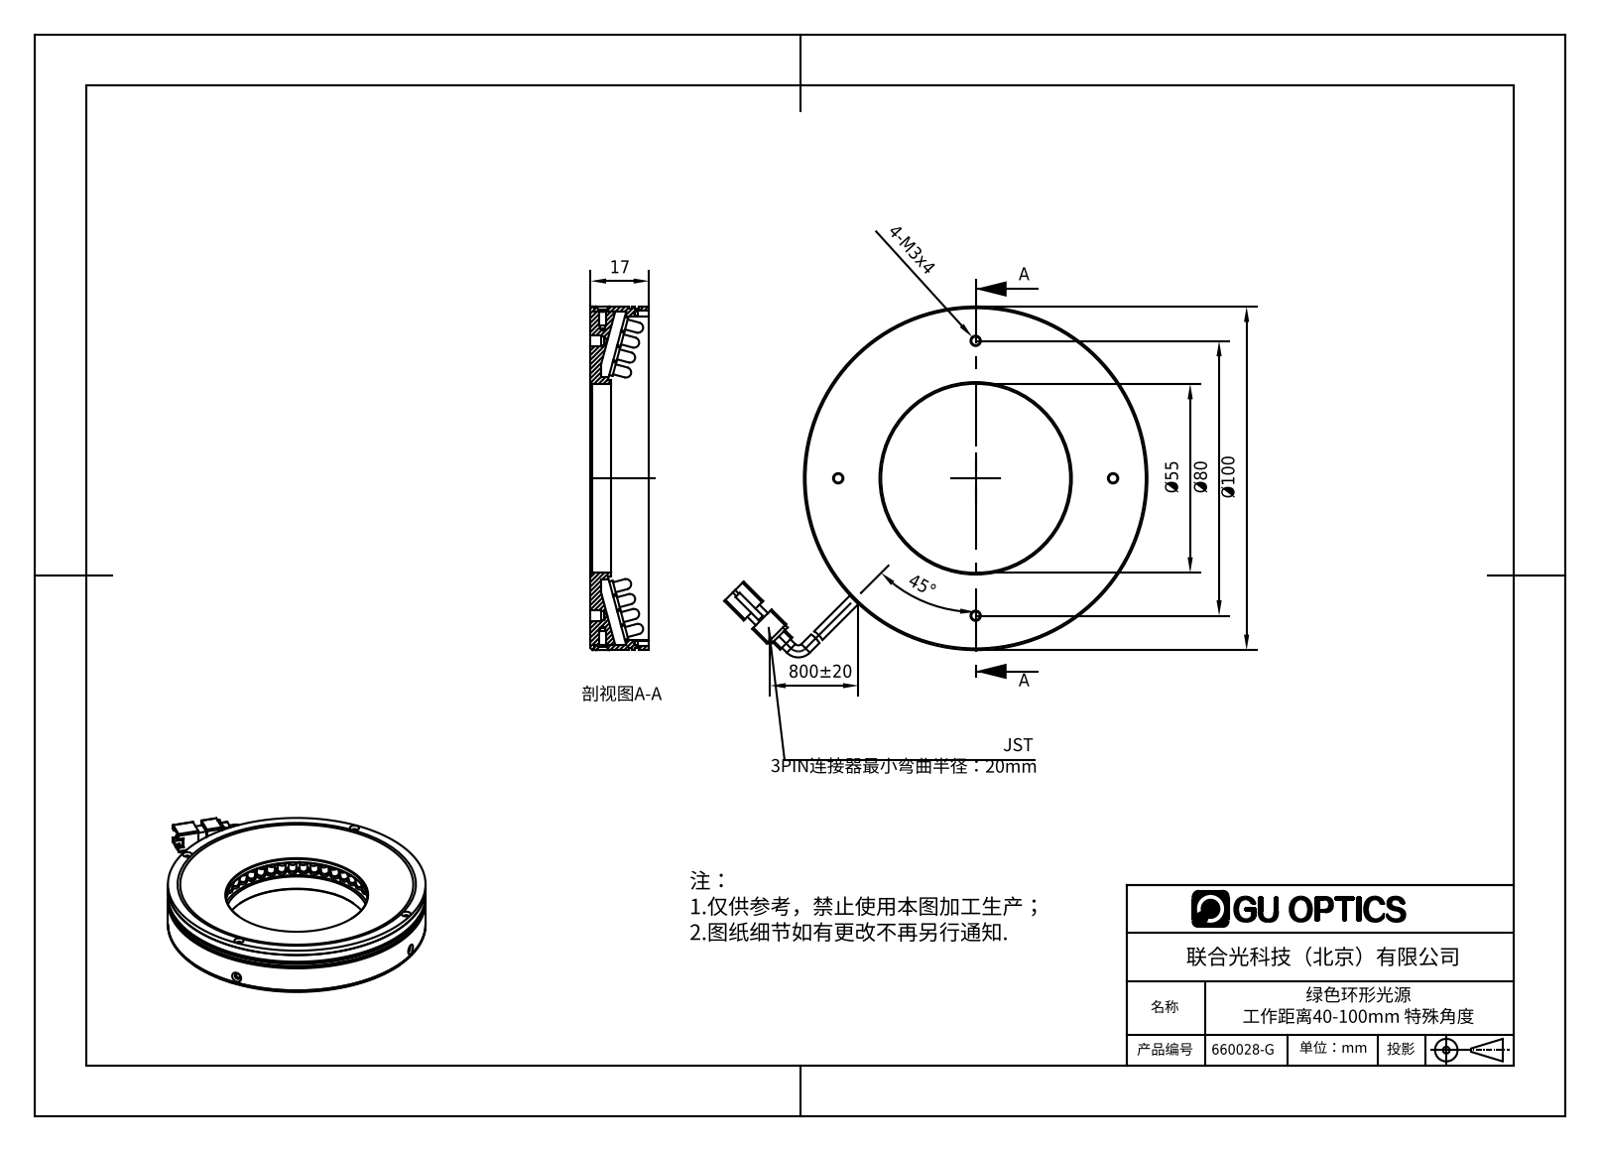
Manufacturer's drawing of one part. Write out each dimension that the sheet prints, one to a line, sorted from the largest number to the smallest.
800±20
Ø100
Ø80
Ø55
45°
17
4-M3x4
